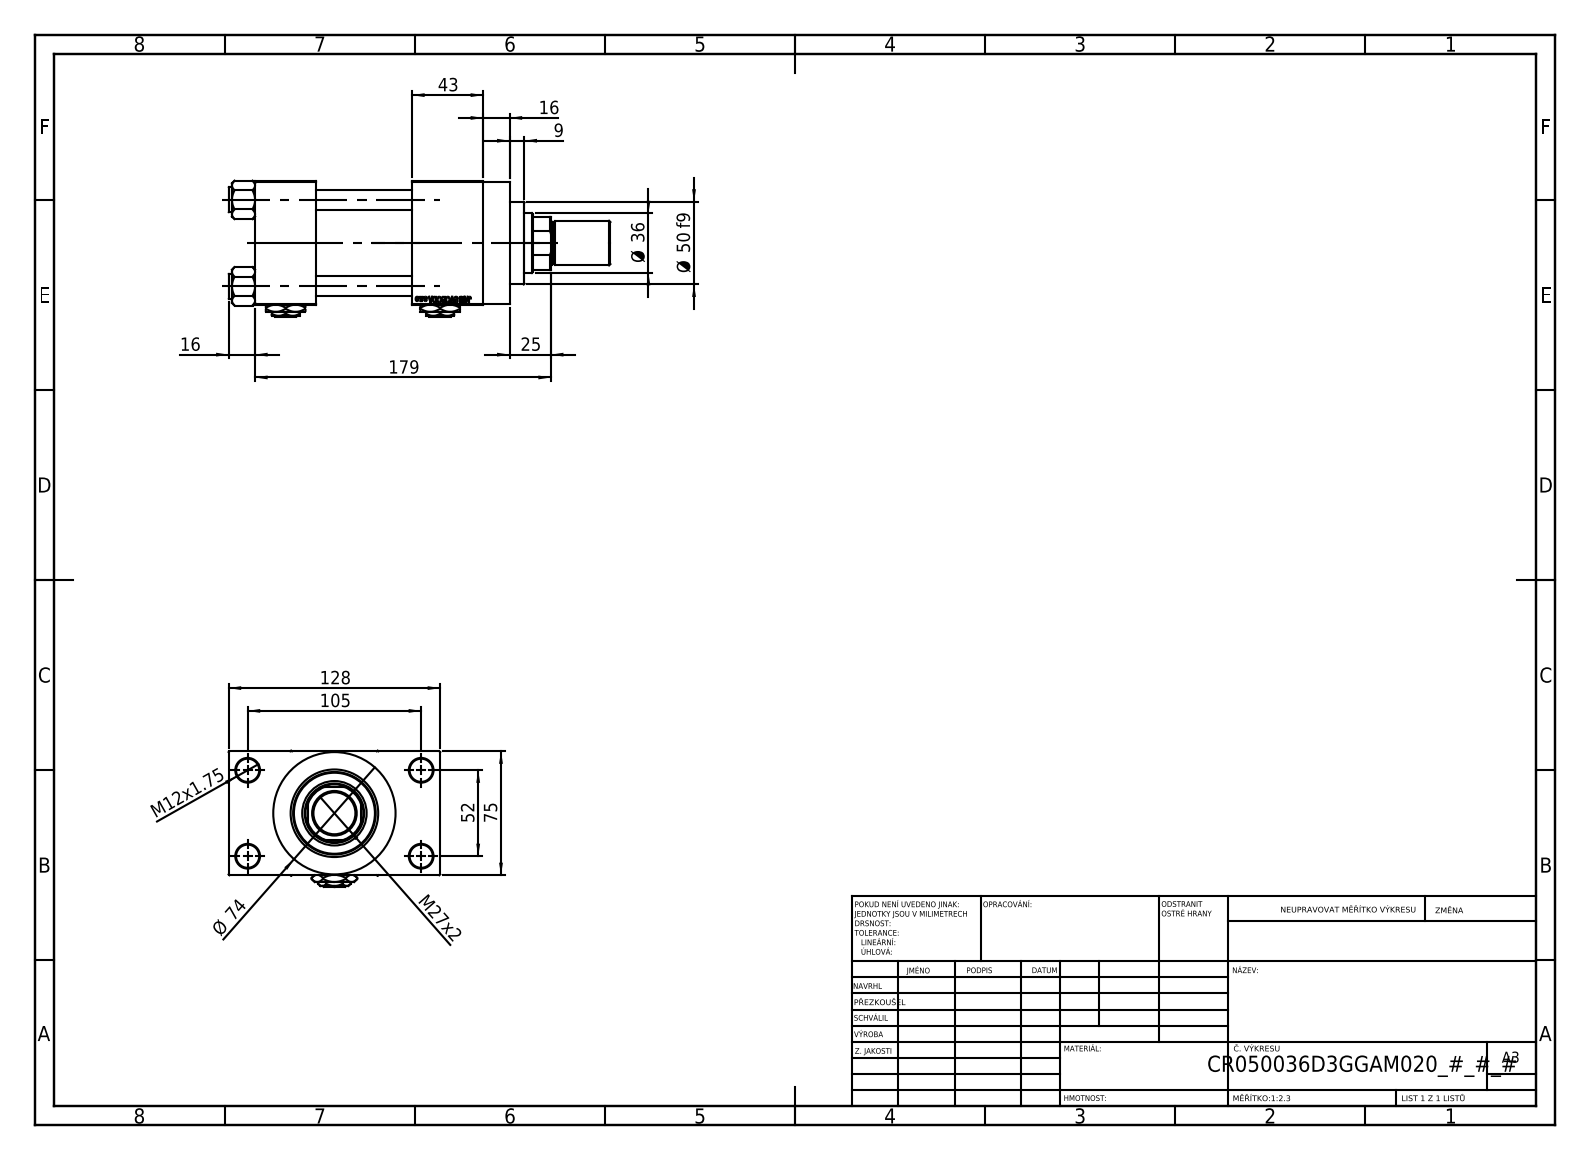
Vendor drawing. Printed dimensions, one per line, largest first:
179
128
105
75
Ø 74
52
Ø 50 f9
43
Ø 36
M27x2
25
16
16
M12x1.75
9
